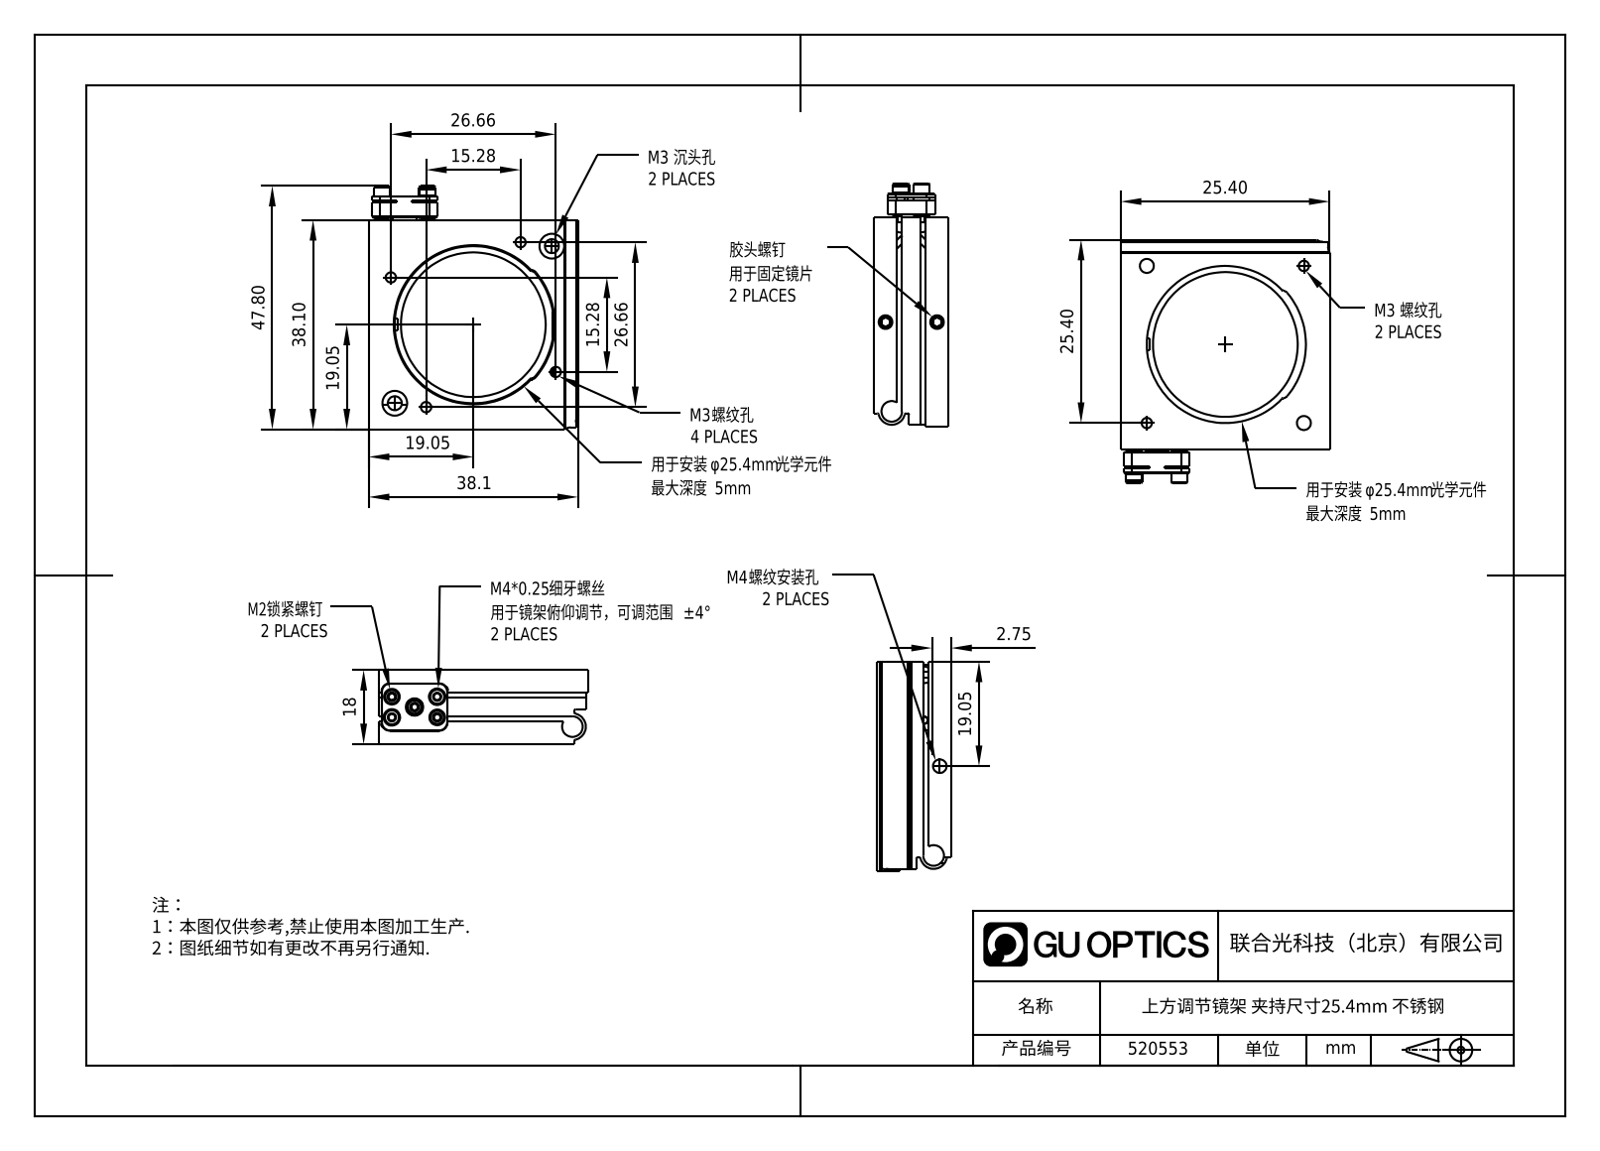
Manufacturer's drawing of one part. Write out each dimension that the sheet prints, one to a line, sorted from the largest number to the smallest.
47.80
38.1
38.10
26.66
26.66
25.40
25.40
19.05
19.05
19.05
18
15.28
15.28
2.75
